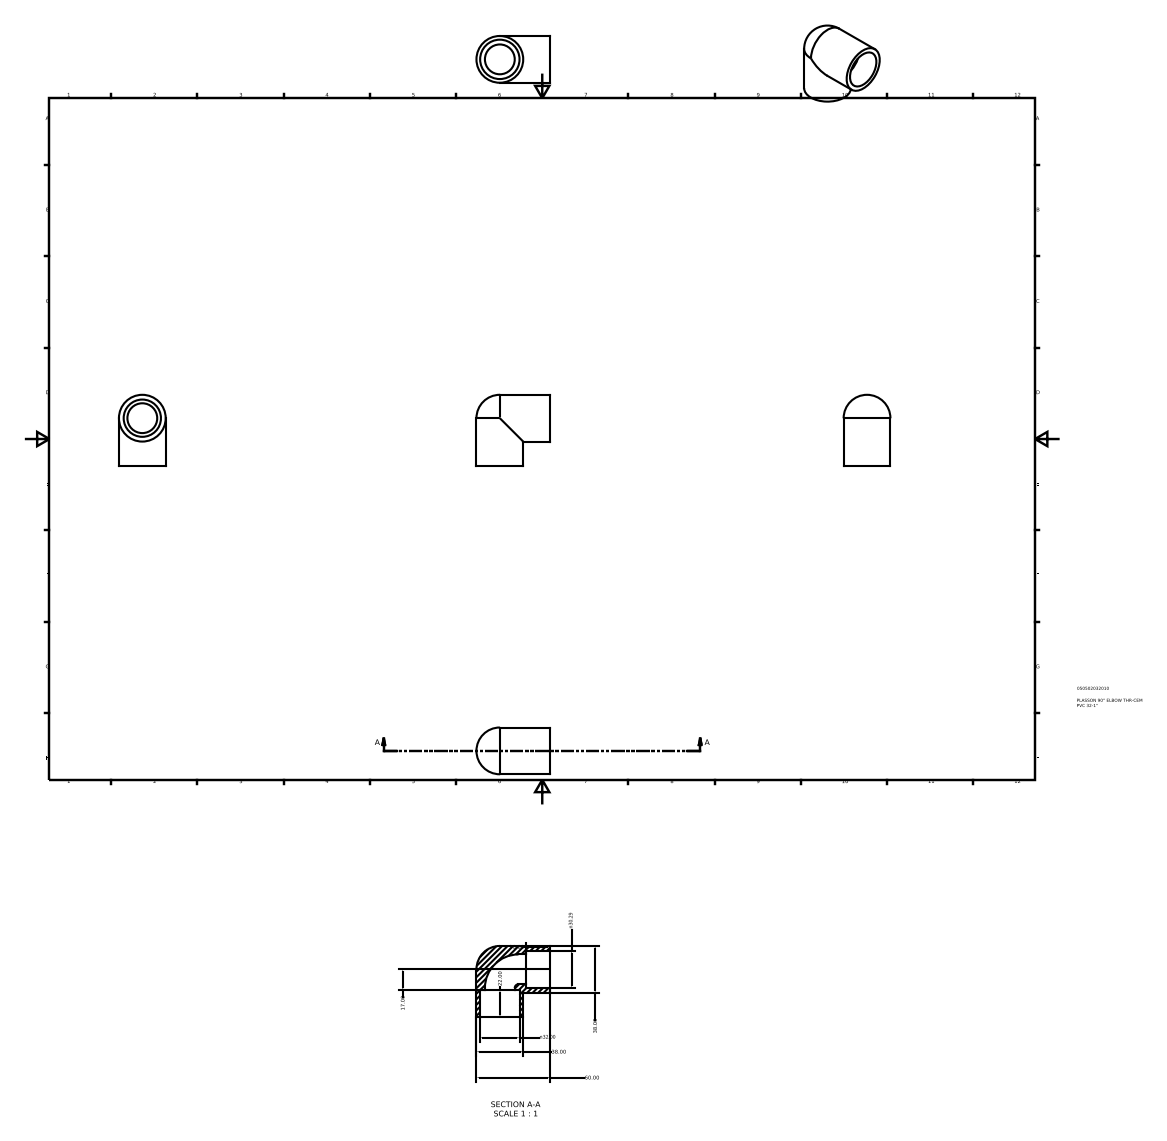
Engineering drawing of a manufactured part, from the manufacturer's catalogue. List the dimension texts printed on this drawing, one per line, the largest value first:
60.00
38.00
38.00
n32.00
n30.29
22.00
20.00
17.00
